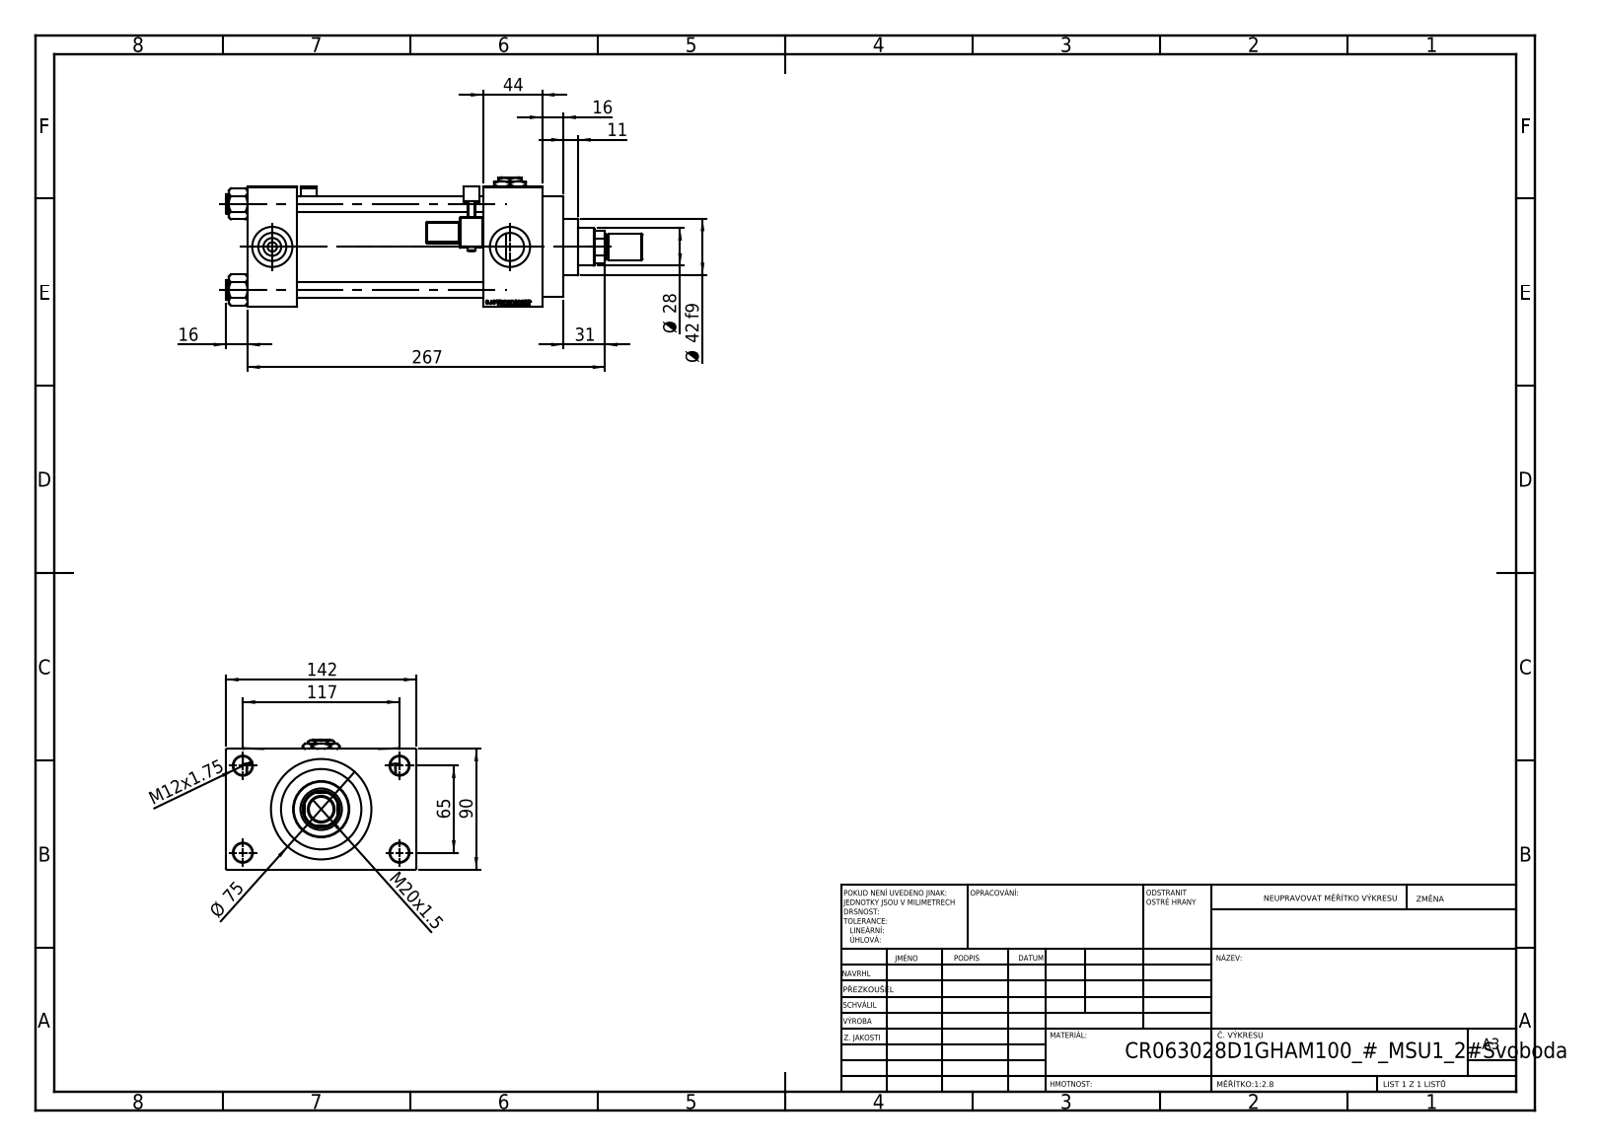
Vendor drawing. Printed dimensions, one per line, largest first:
267
142
117
90
Ø 75
65
44
Ø 42 f9
31
Ø 28
M20x1.5
16
16
M12x1.75
11
